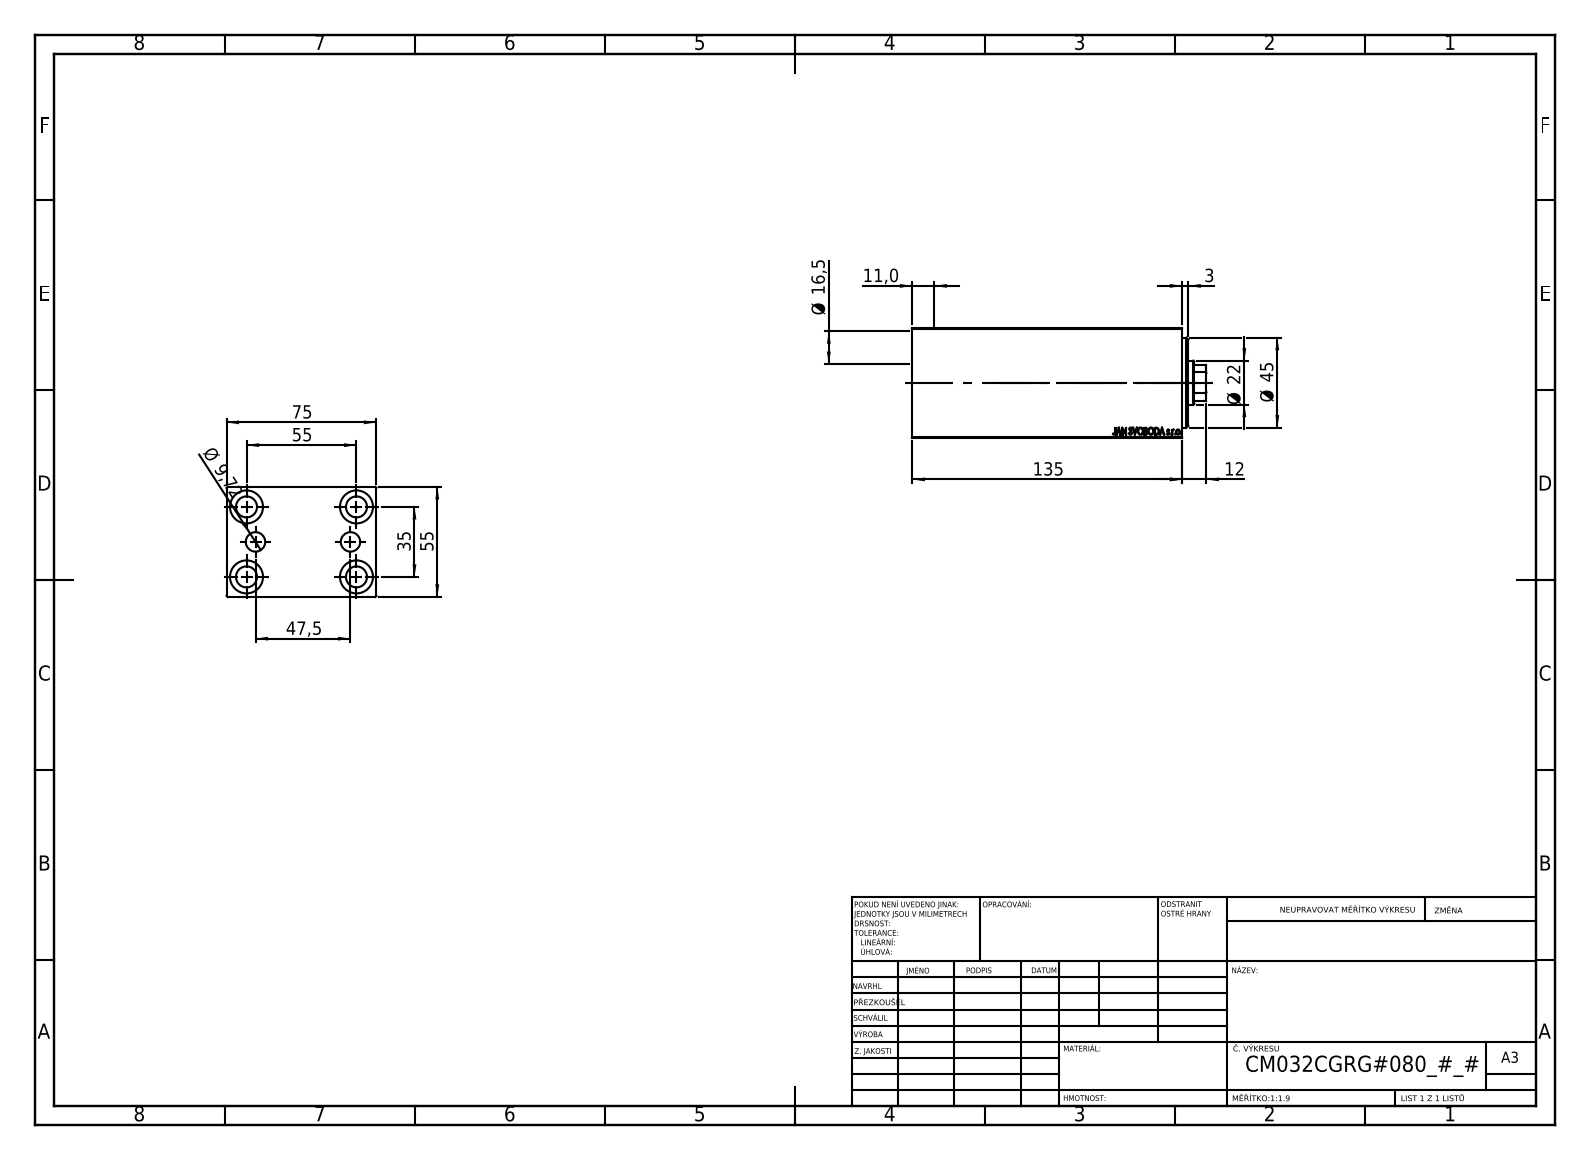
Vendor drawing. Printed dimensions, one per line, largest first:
135
75
55
55
47,5
Ø 45
35
Ø 22
Ø 16,5
12
11,0
Ø 9,72
3
